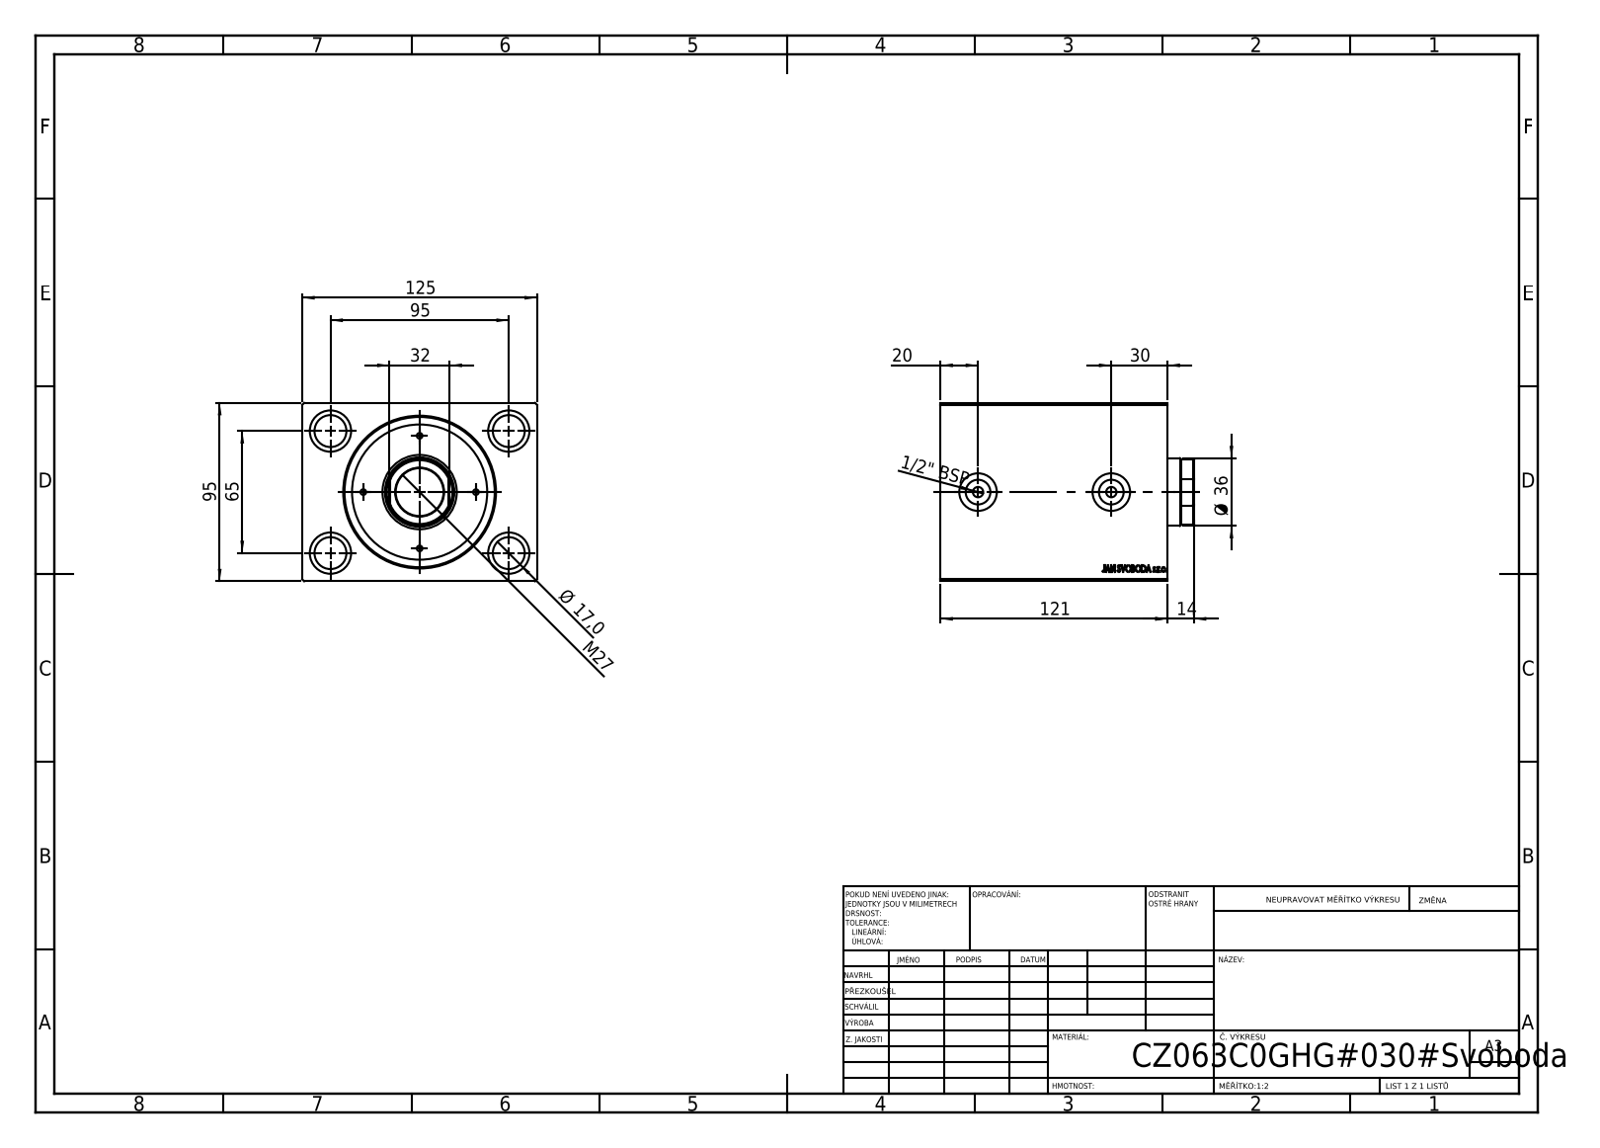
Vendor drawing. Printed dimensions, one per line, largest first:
125
121
95
95
65
Ø 36
32
30
M27
20
Ø 17,0
14
1/2" BSP
